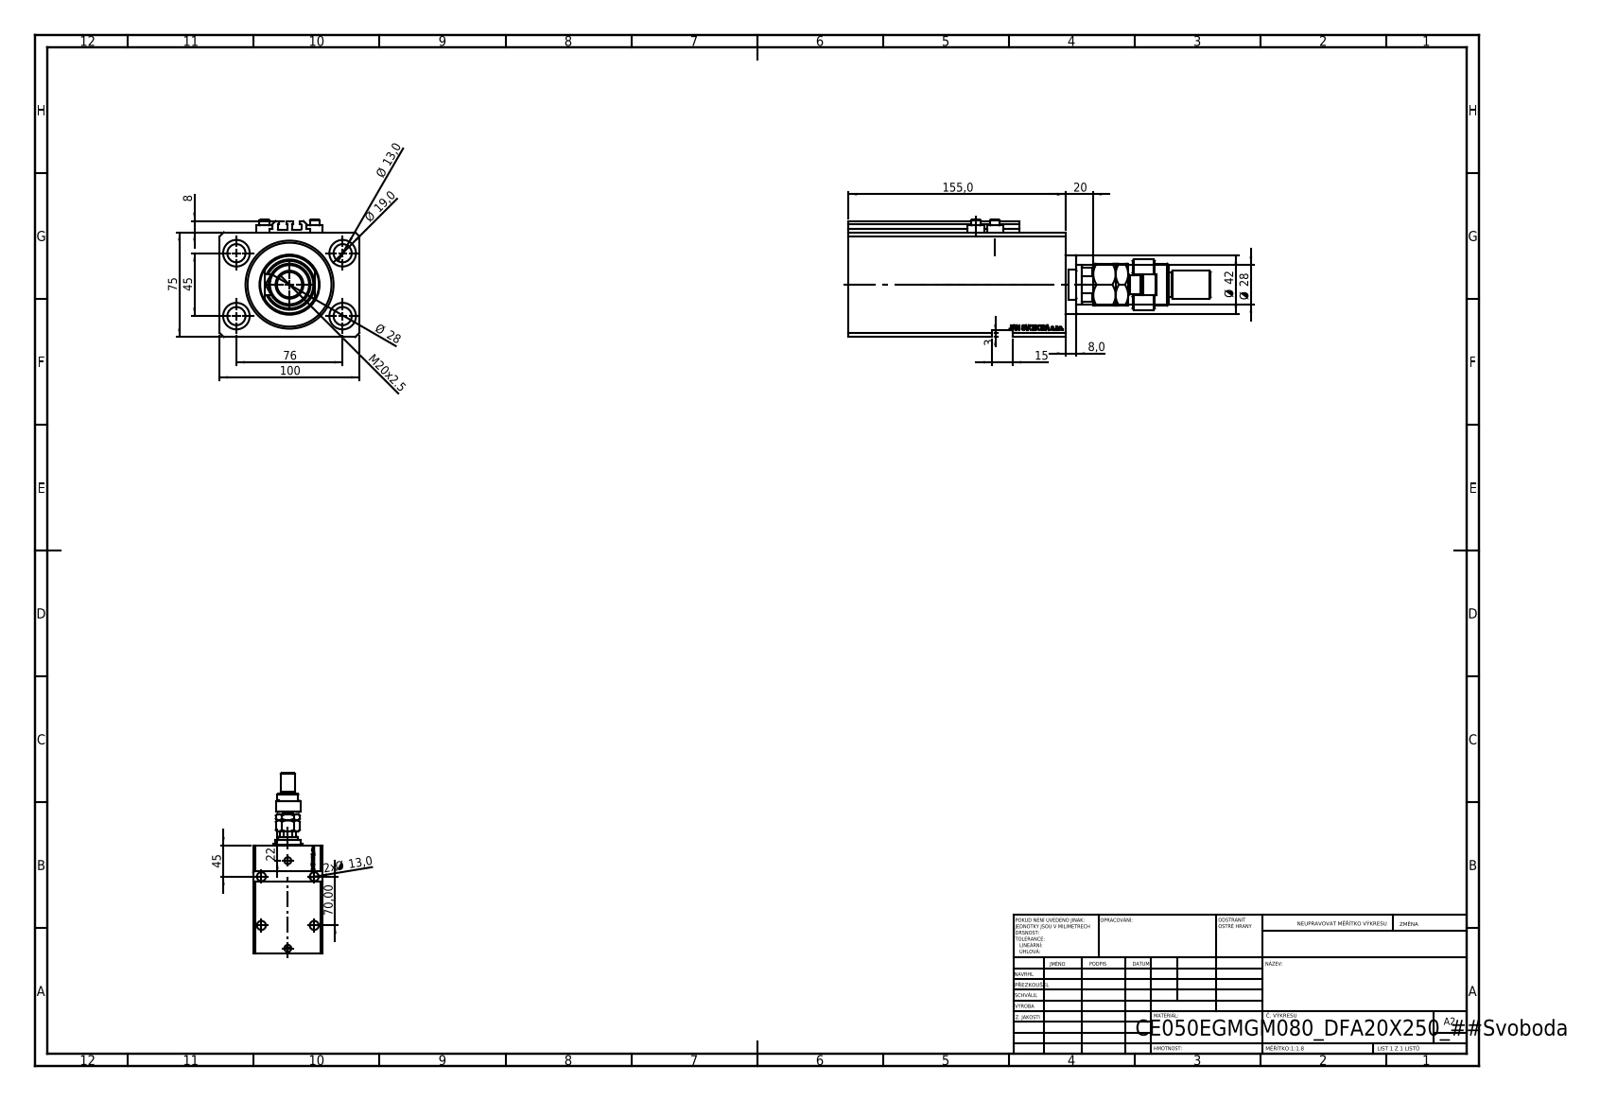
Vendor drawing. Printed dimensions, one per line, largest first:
155,0
100
76
75
70,00
45
45
Ø 42
Ø 28
Ø 28
22
M20x2.5
20
Ø 19,0
15
Ø 13,0
2x Ø 13,0
8
8,0
3
